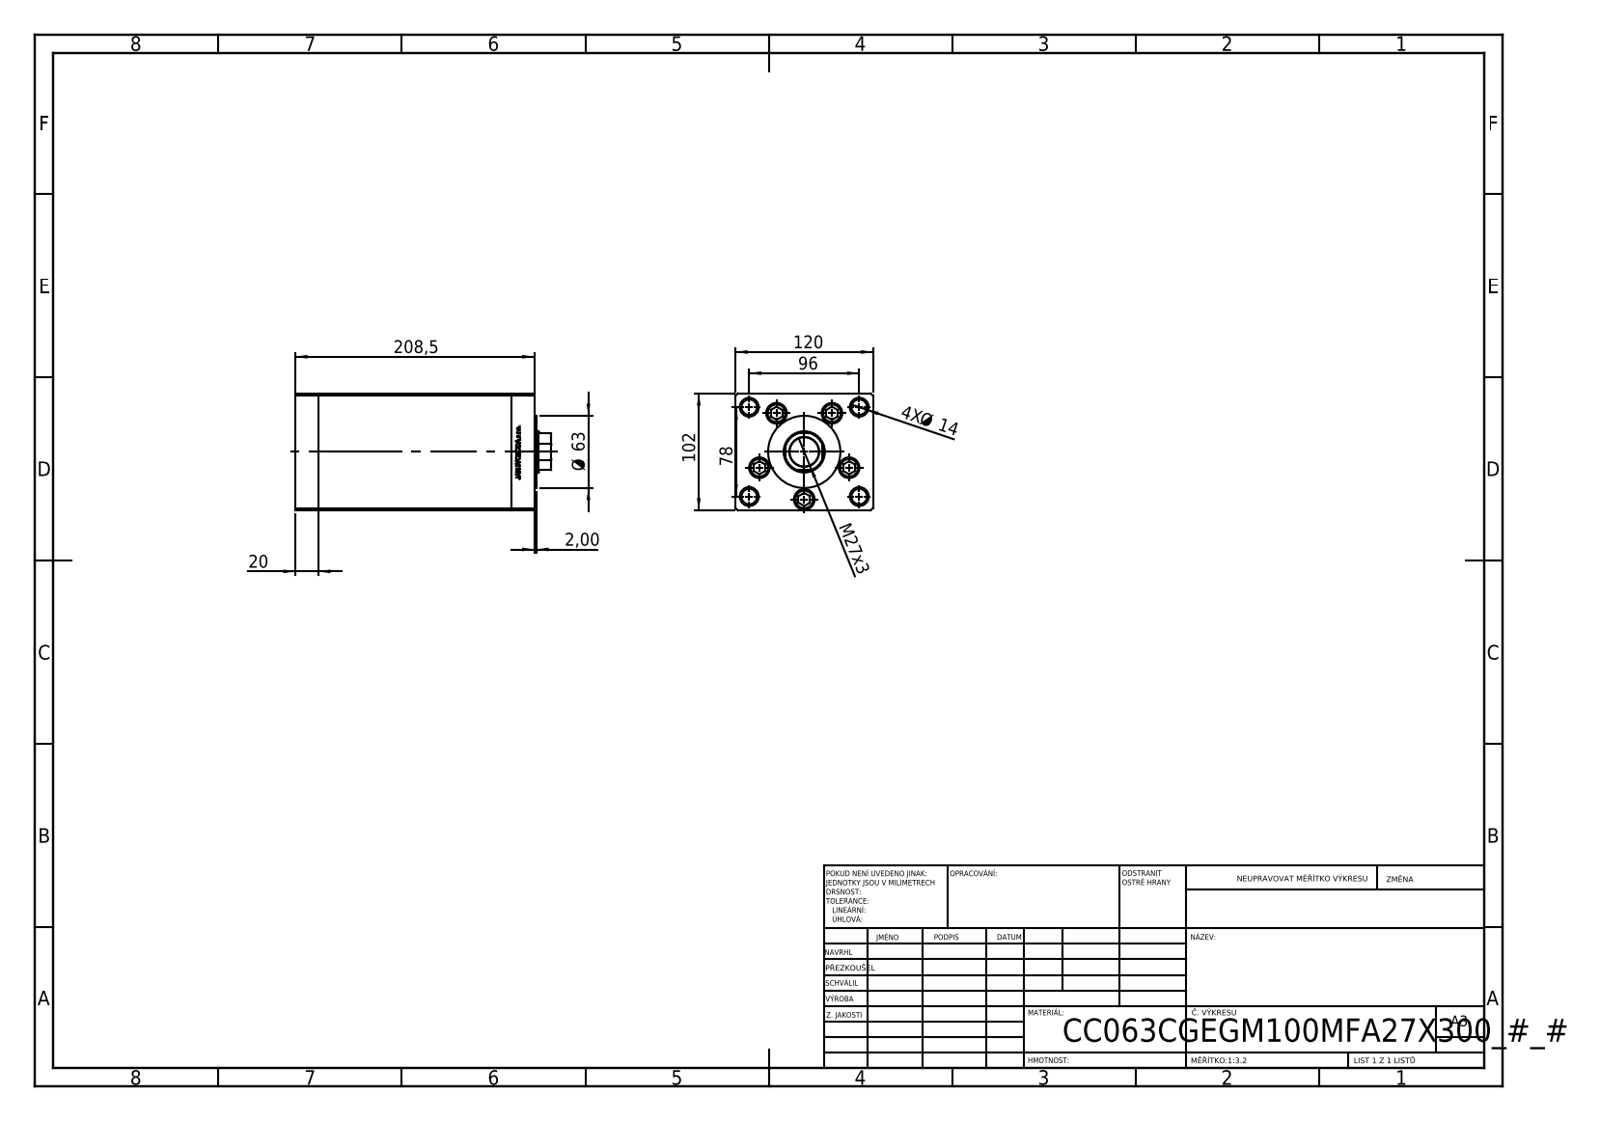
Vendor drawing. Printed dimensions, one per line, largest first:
208,5
120
102
96
78
Ø 63
M27x3
20
4X Ø 14
2,00
